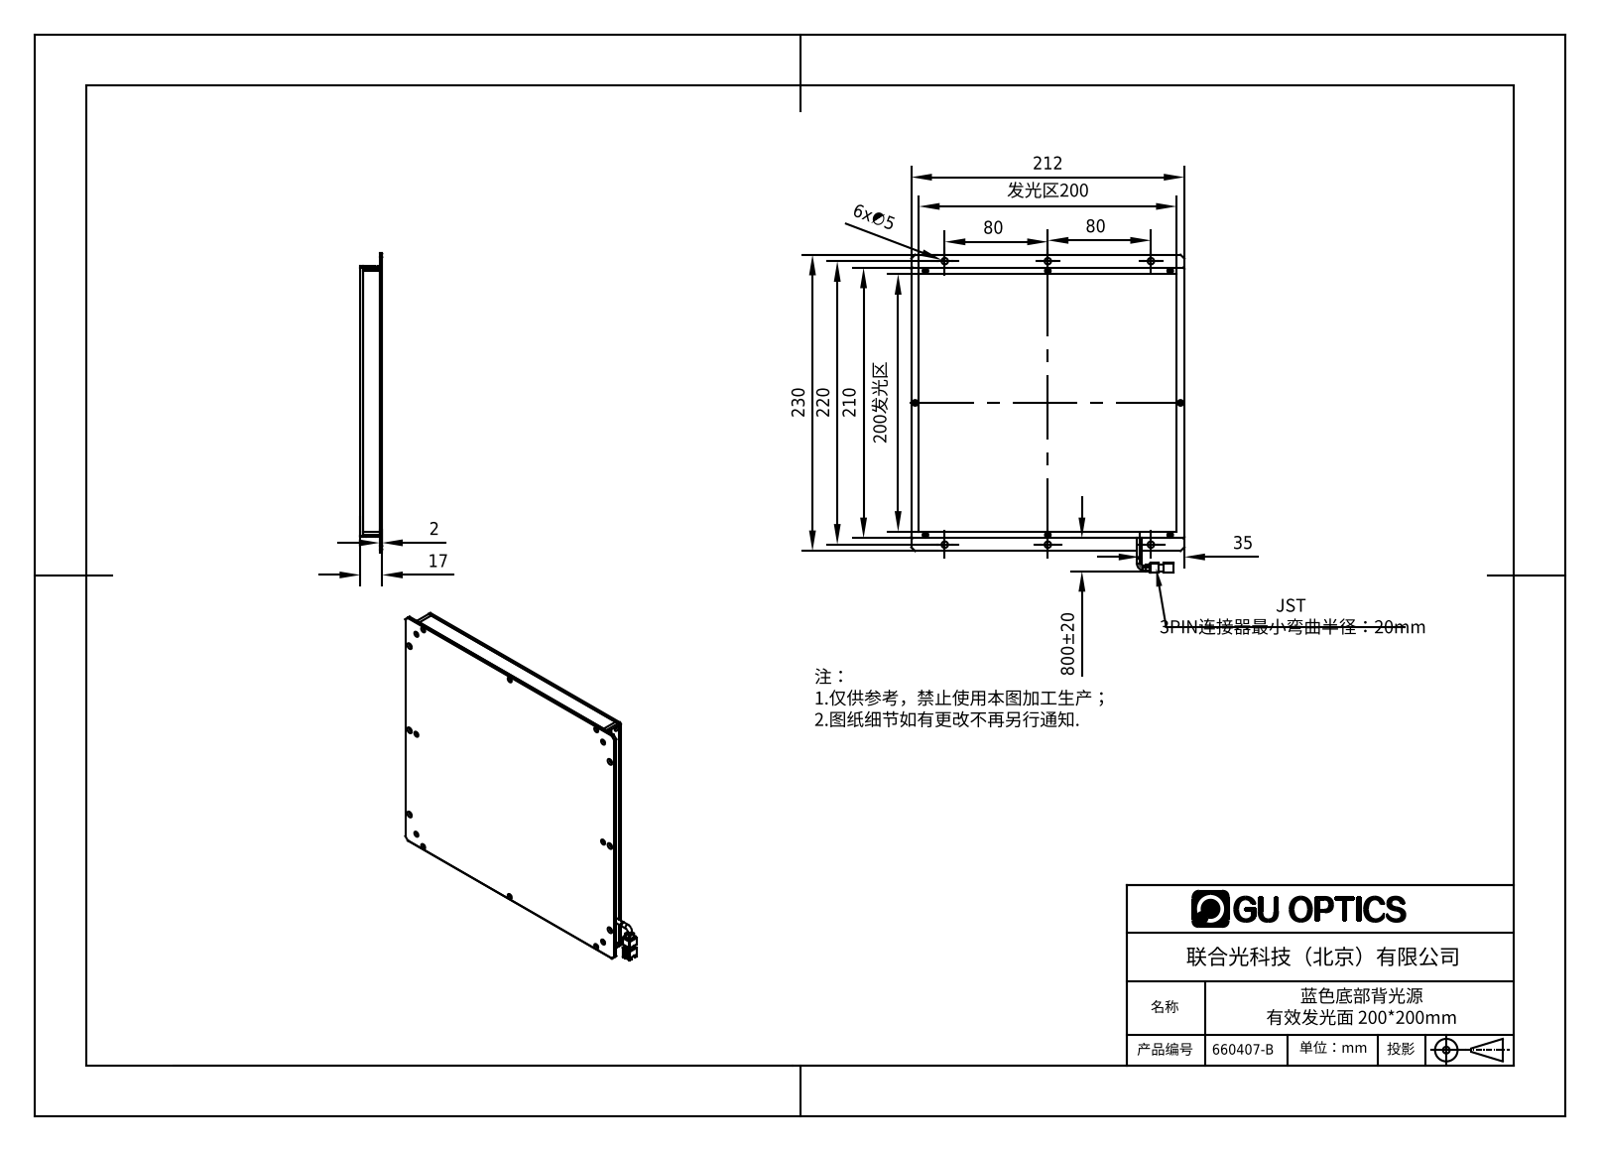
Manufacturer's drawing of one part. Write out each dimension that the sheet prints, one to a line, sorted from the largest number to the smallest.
800±20
230
220
212
210
200发光区
发光区200
80
80
35
17
6x∅5
2
